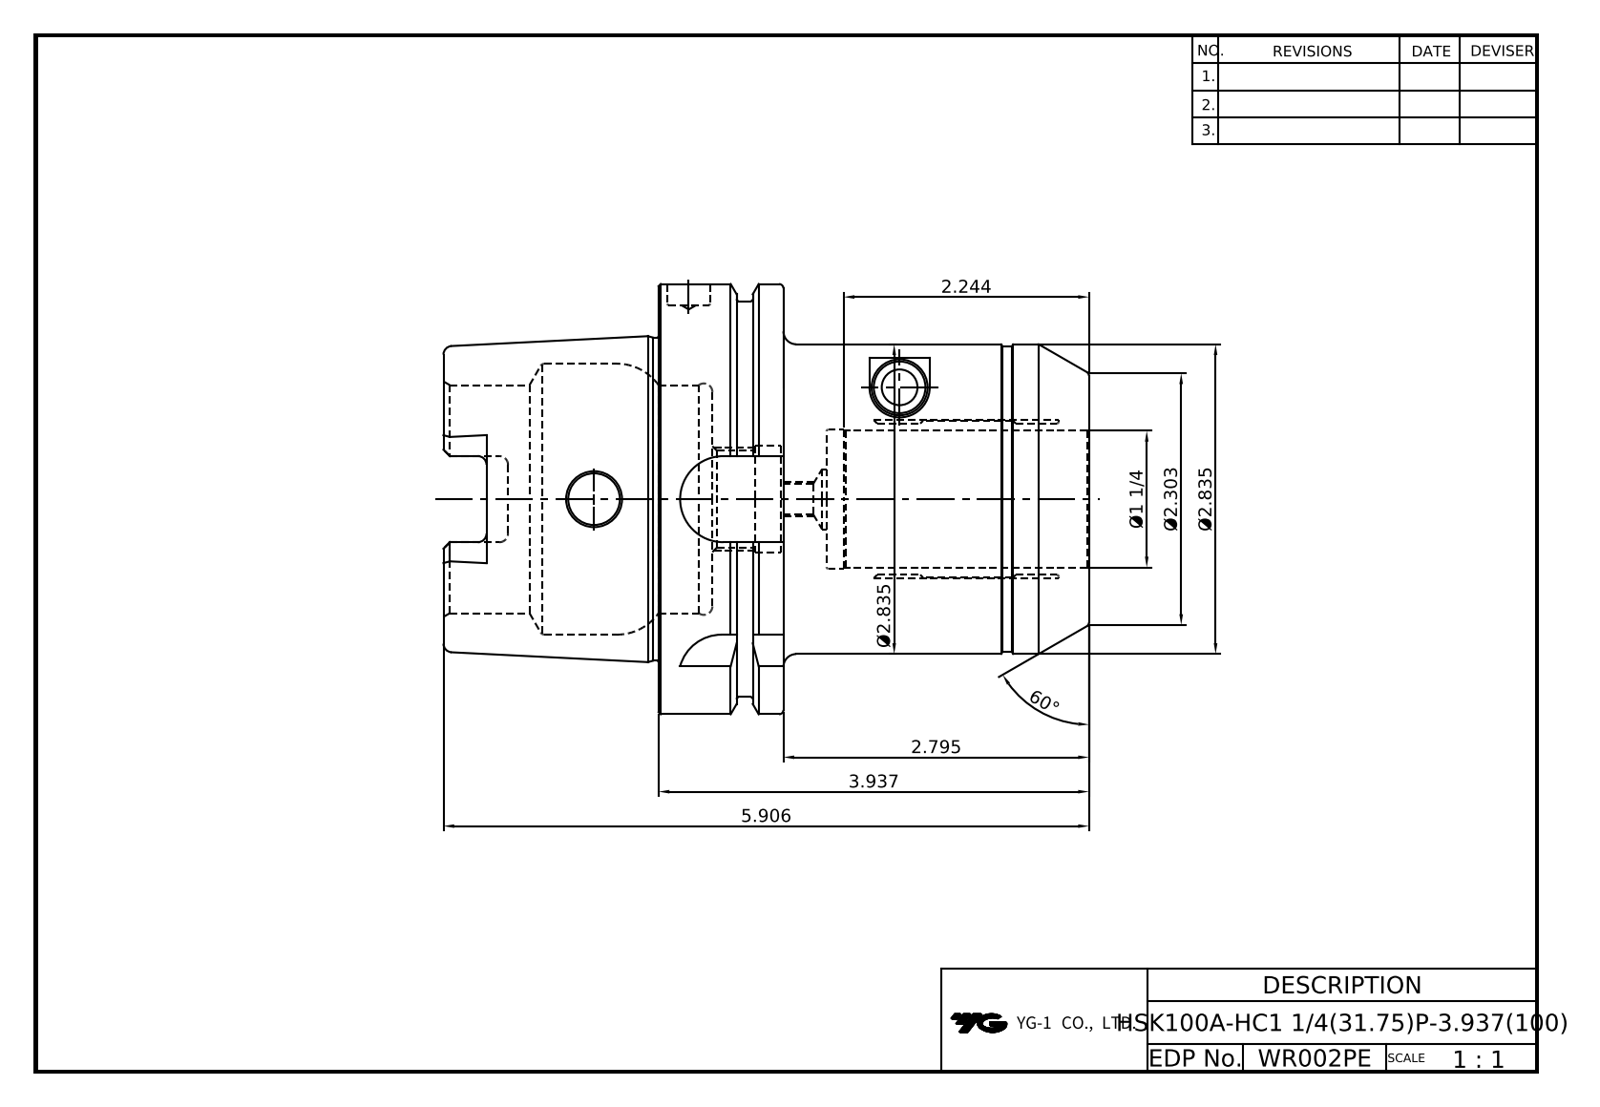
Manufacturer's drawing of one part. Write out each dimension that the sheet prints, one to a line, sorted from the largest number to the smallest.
60°
5.906
3.937
Ø2.835
Ø2.835
2.795
Ø2.303
2.244
Ø1 1/4
